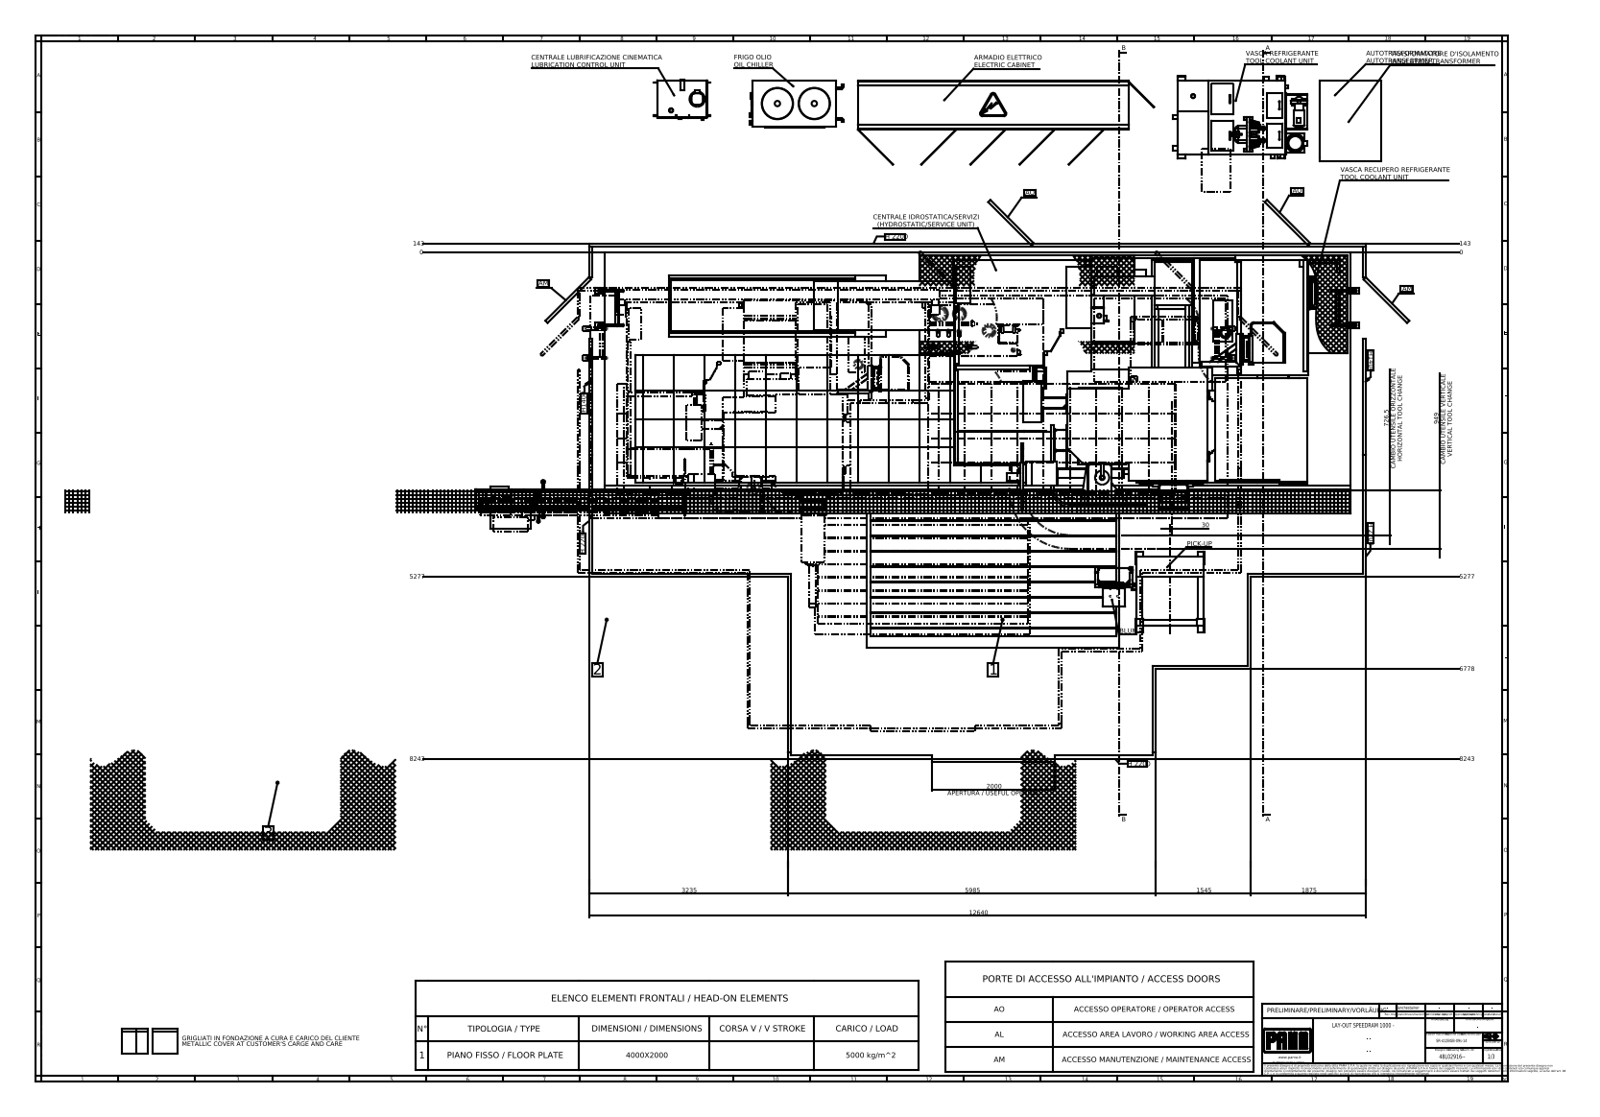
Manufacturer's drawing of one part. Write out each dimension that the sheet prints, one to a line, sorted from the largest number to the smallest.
12640
8243
8243
6778
5985
5277
5277
3235
2000 APERTURA / USEFUL OPENING
1875
1545
949 CAMBIO UTENSILE VERTICALE VERTICAL TOOL CHANGE
726,5 CAMBIO UTENSILE ORIZZONTALE HORIZONTAL TOOL CHANGE
143
143
30
0
0
